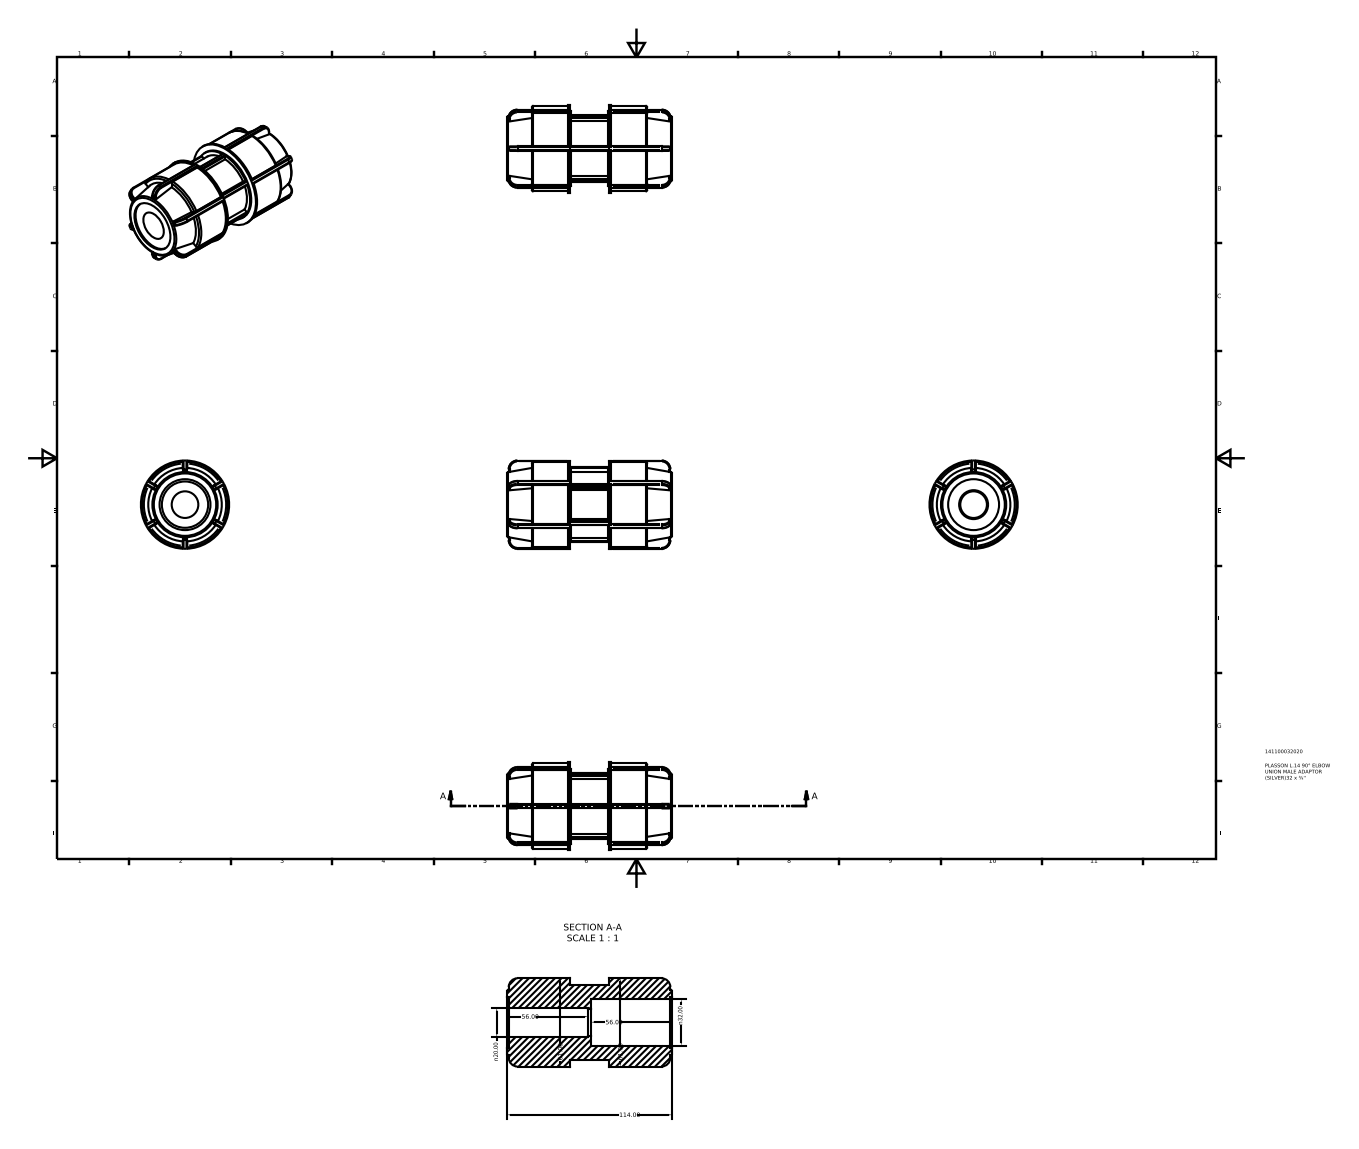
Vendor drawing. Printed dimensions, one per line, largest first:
114.00
61.00
61.00
56.00
56.00
n32.00
n20.00
